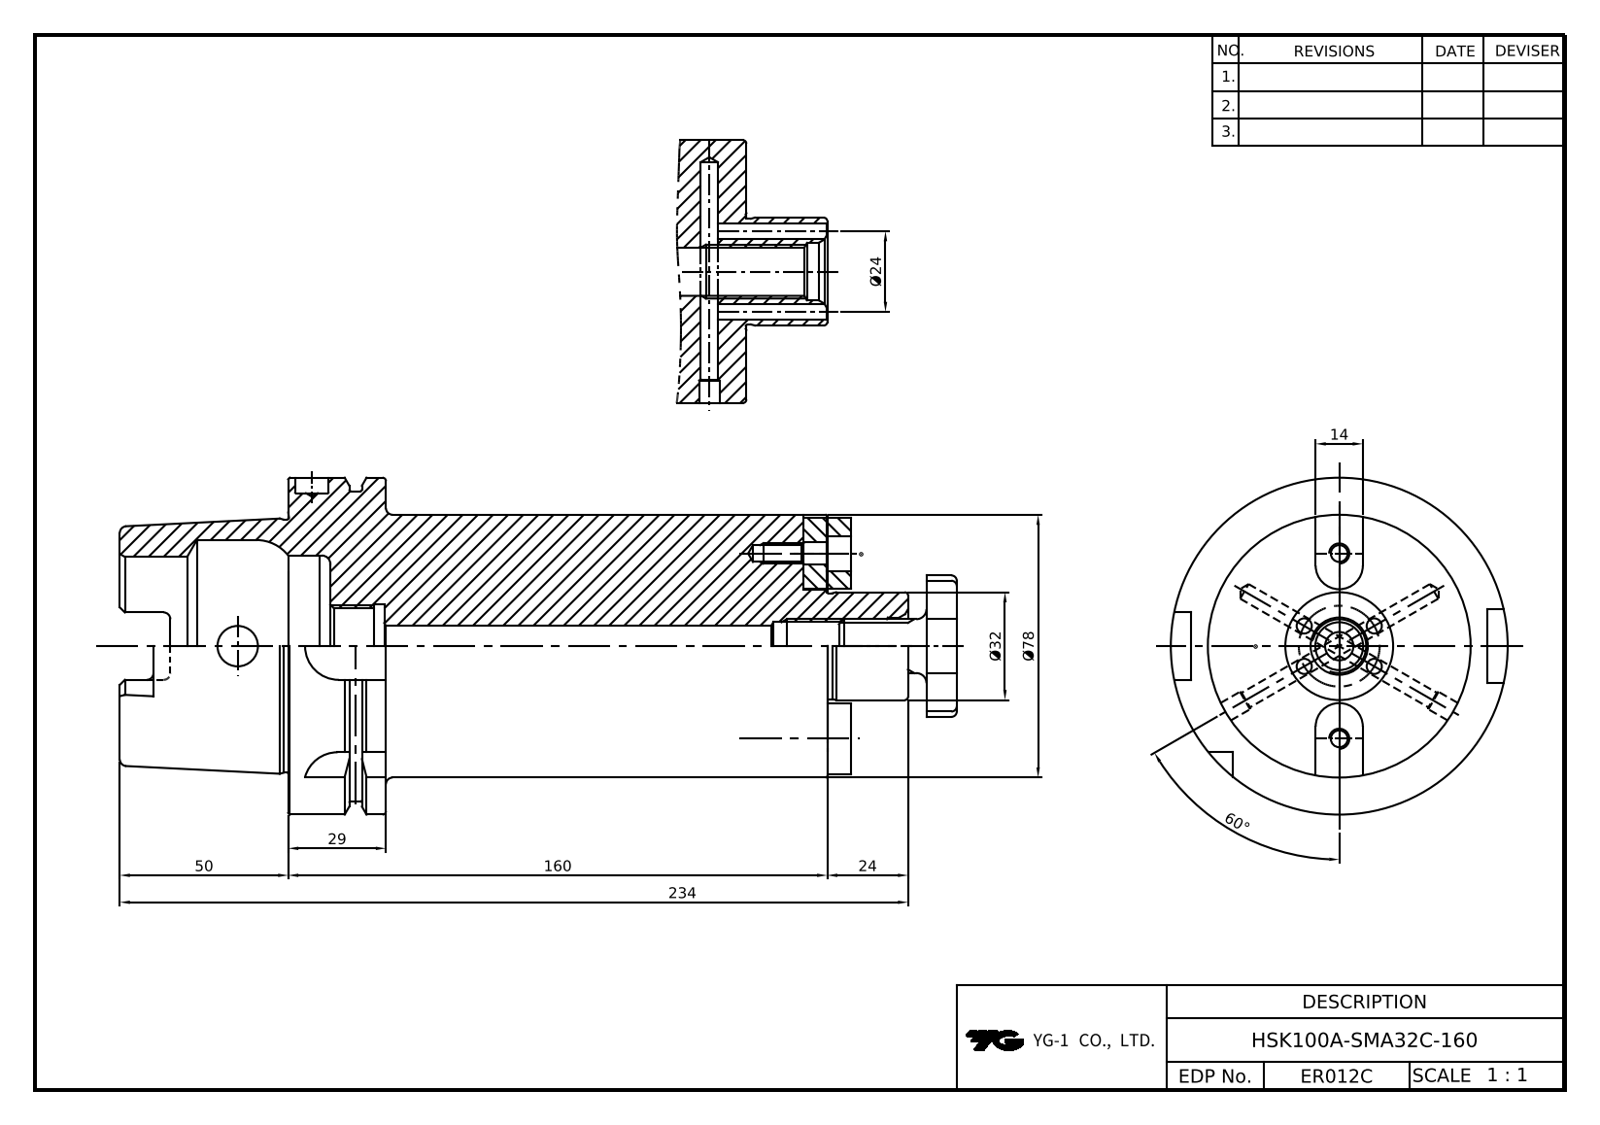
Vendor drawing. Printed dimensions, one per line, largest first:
234
160
Ø78
60°
50
Ø32
29
24
Ø24
14
